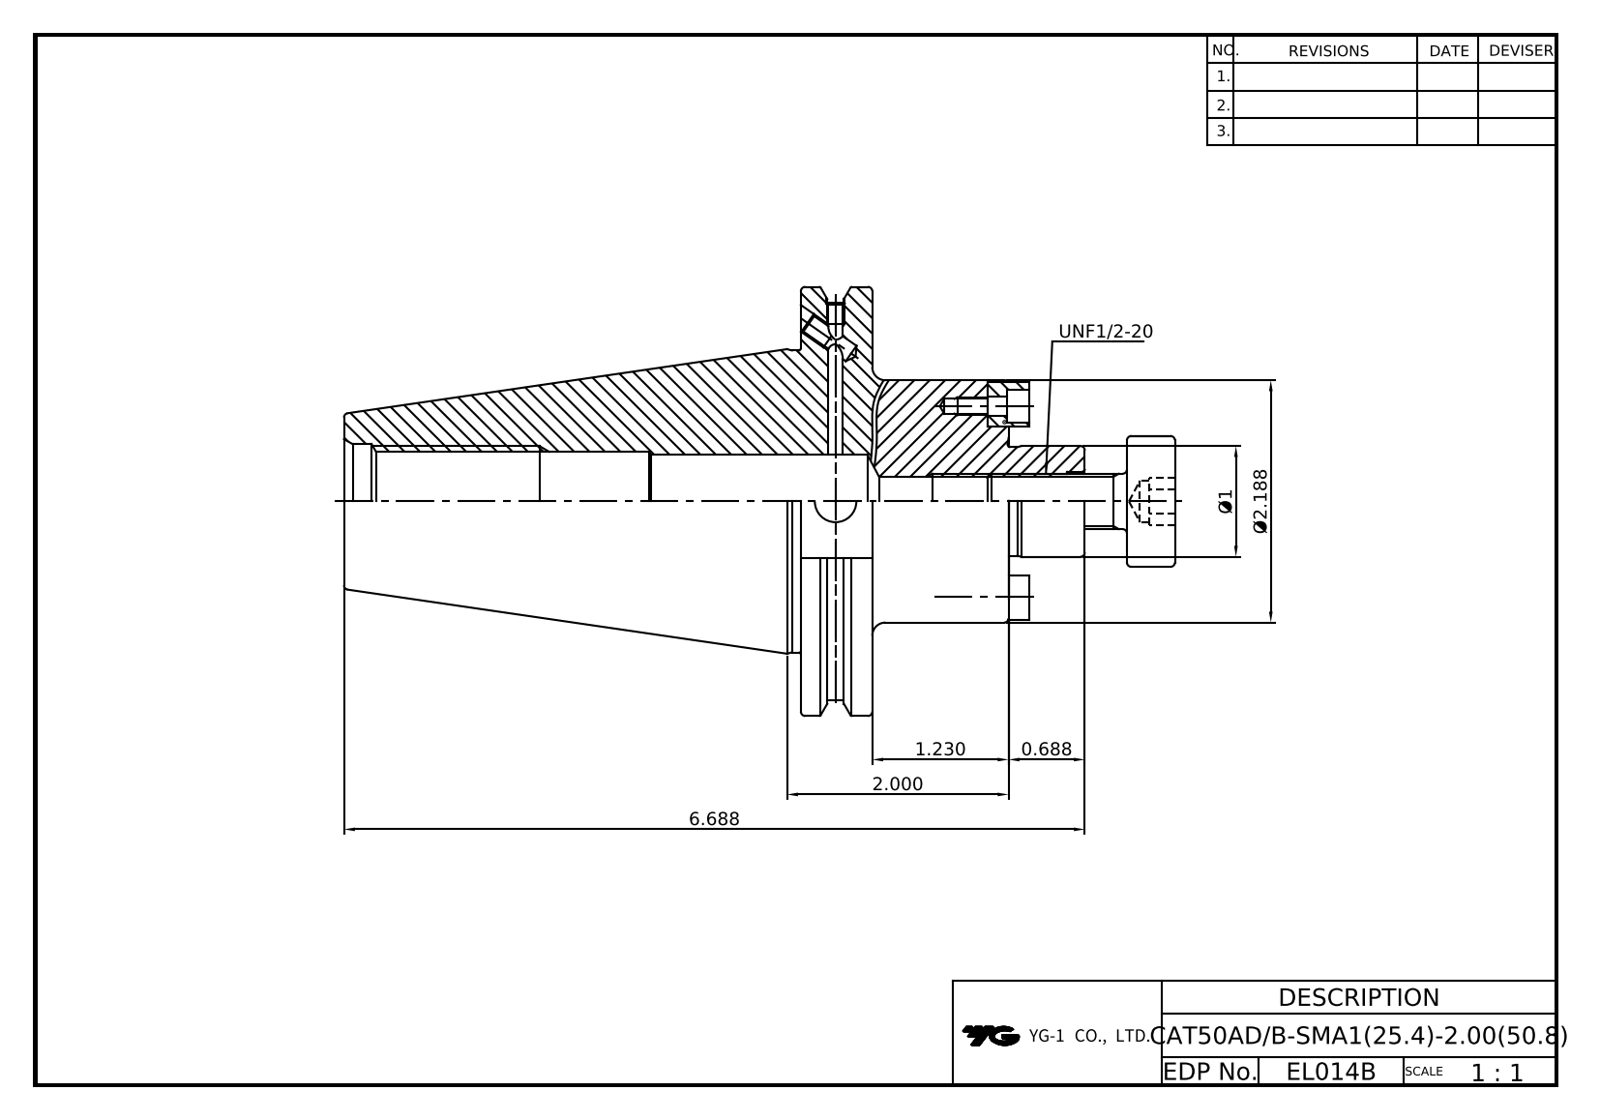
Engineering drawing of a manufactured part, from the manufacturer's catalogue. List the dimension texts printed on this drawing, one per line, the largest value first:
6.688
Ø2.188
2.000
1.230
Ø1
0.688
